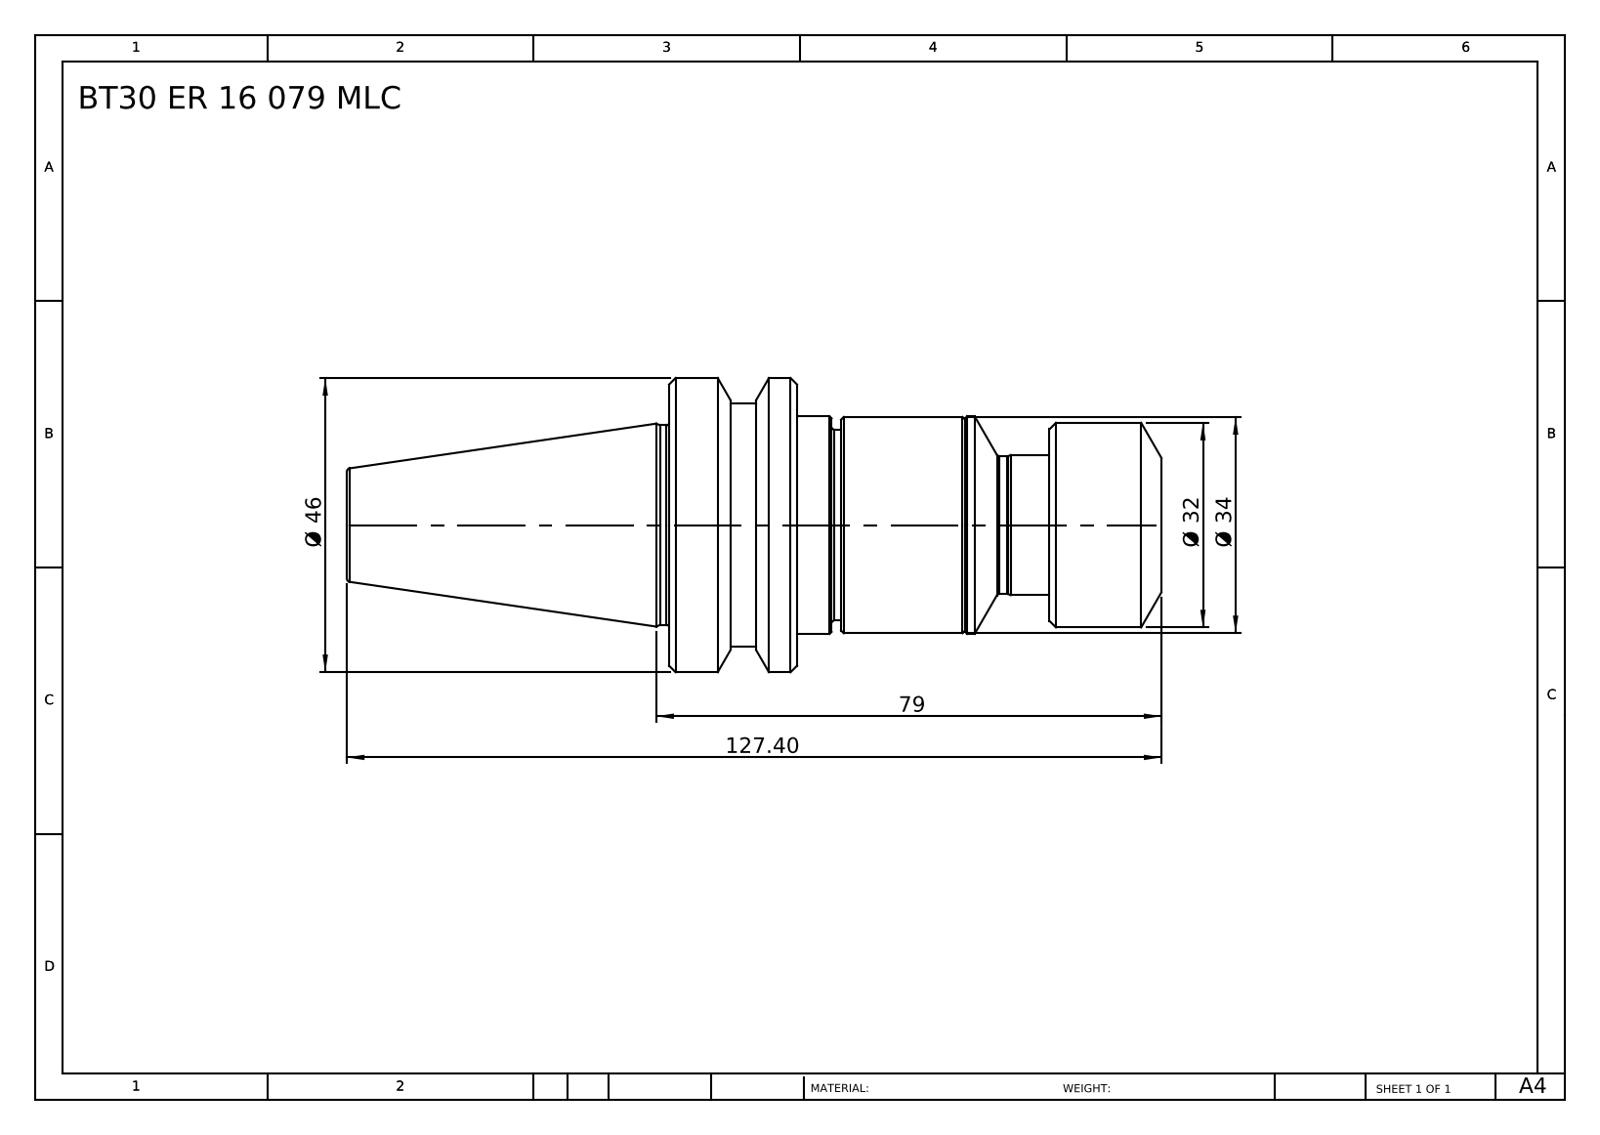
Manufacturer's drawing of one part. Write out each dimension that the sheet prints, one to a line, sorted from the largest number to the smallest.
127.40
79
Ø 46
Ø 34
Ø 32
